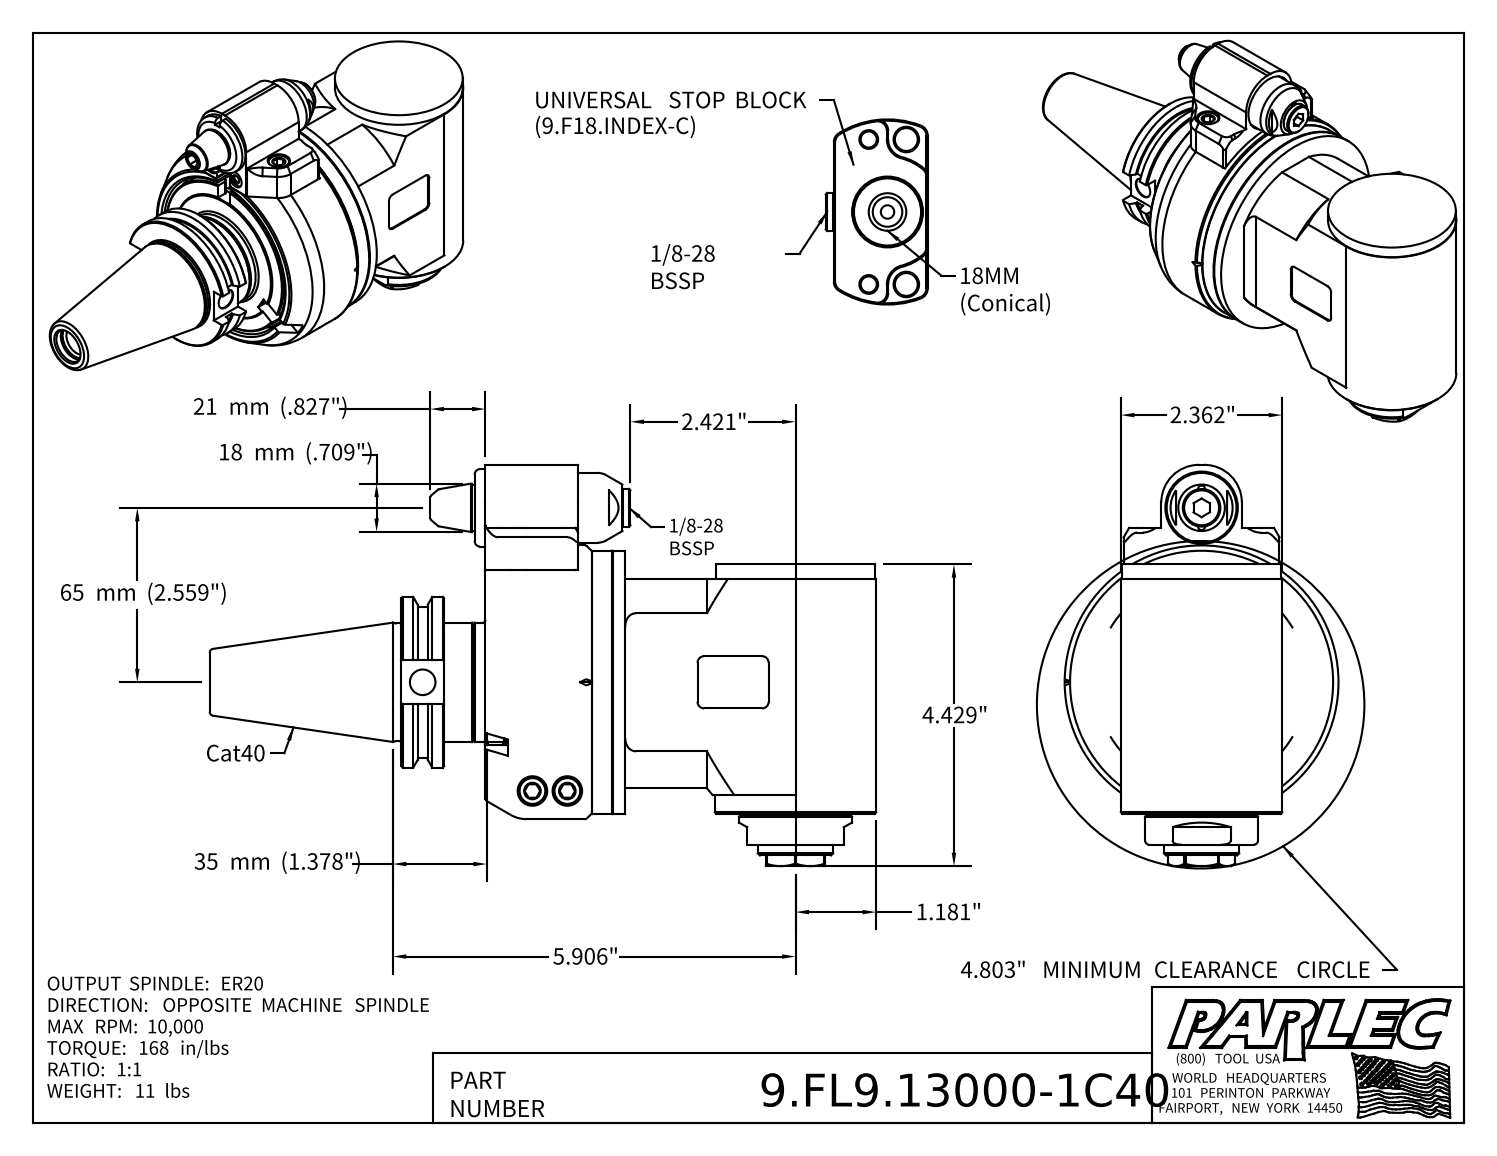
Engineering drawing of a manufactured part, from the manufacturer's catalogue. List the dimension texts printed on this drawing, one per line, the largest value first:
65 mm (2.559")
35 mm (1.378")
21 mm (.827")
18 mm (.709")
5.906"
4.429"
2.421"
2.362"
1.181"
